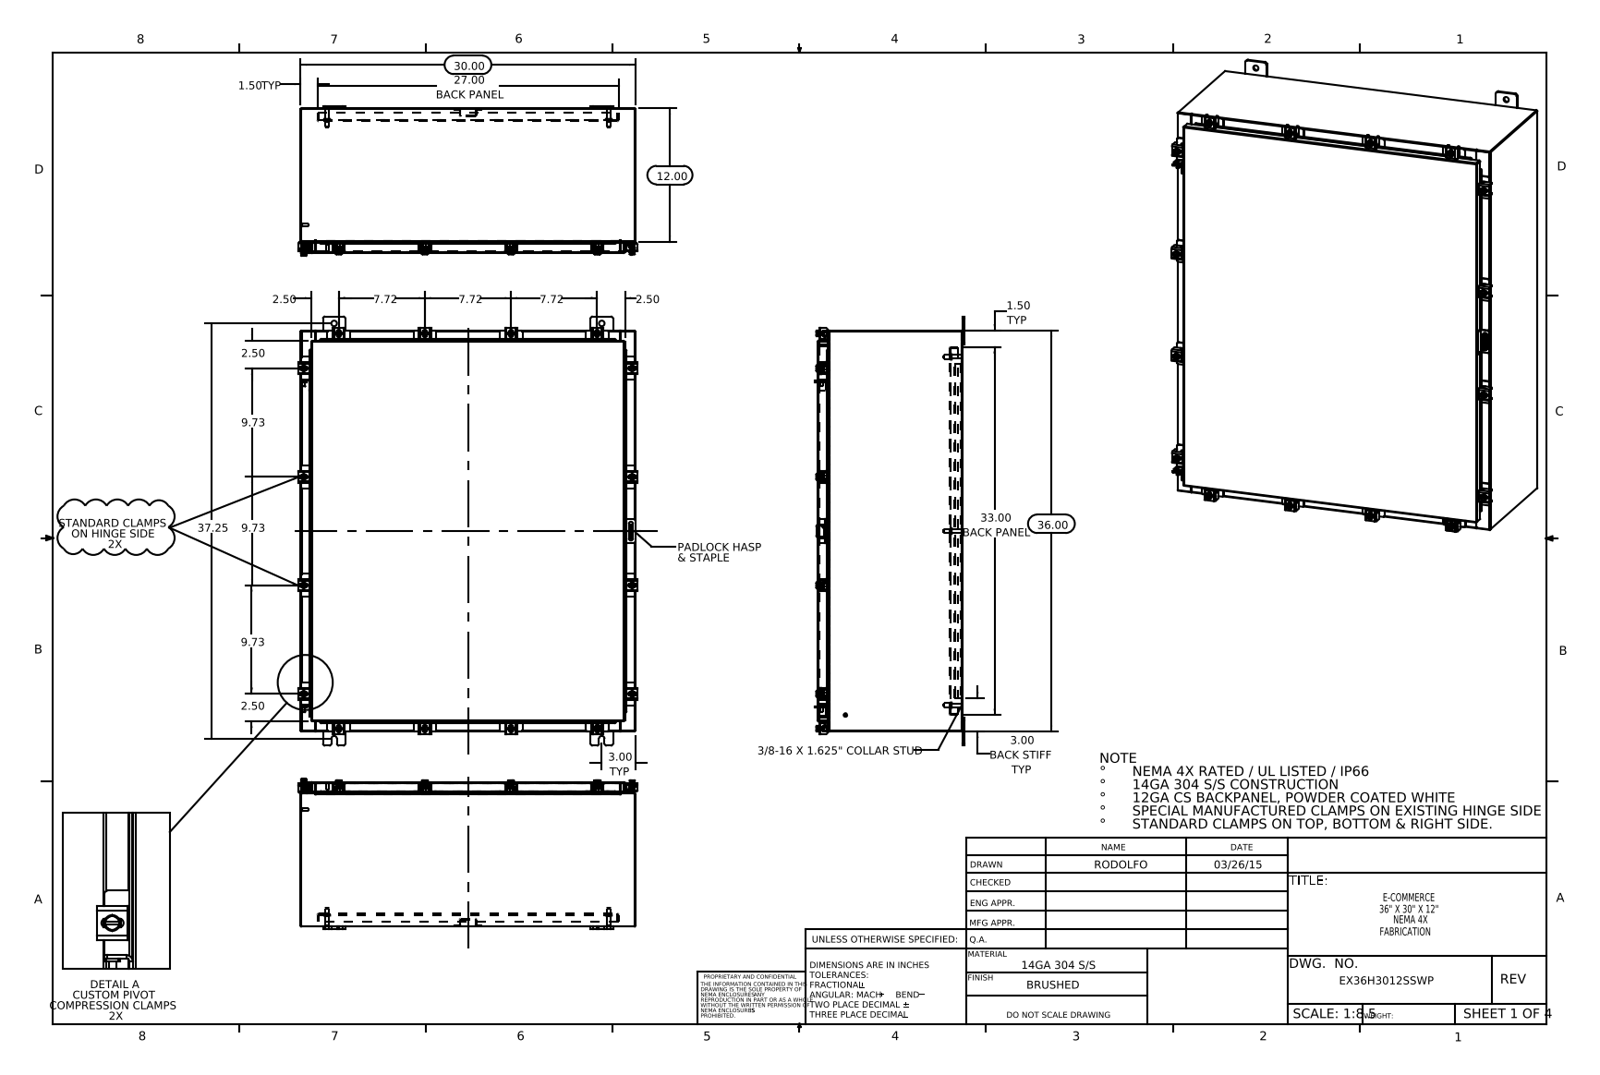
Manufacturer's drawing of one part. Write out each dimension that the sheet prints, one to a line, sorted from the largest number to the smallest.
37.25
36.00
33.00 BACK PANEL
30.00
27.00 BACK PANEL
12.00
9.73
9.73
9.73
7.72
7.72
7.72
3.00 TYP
3.00 BACK STIFF TYP
2.50
2.50
2.50
2.50
1.50 TYP
1.50 TYP
